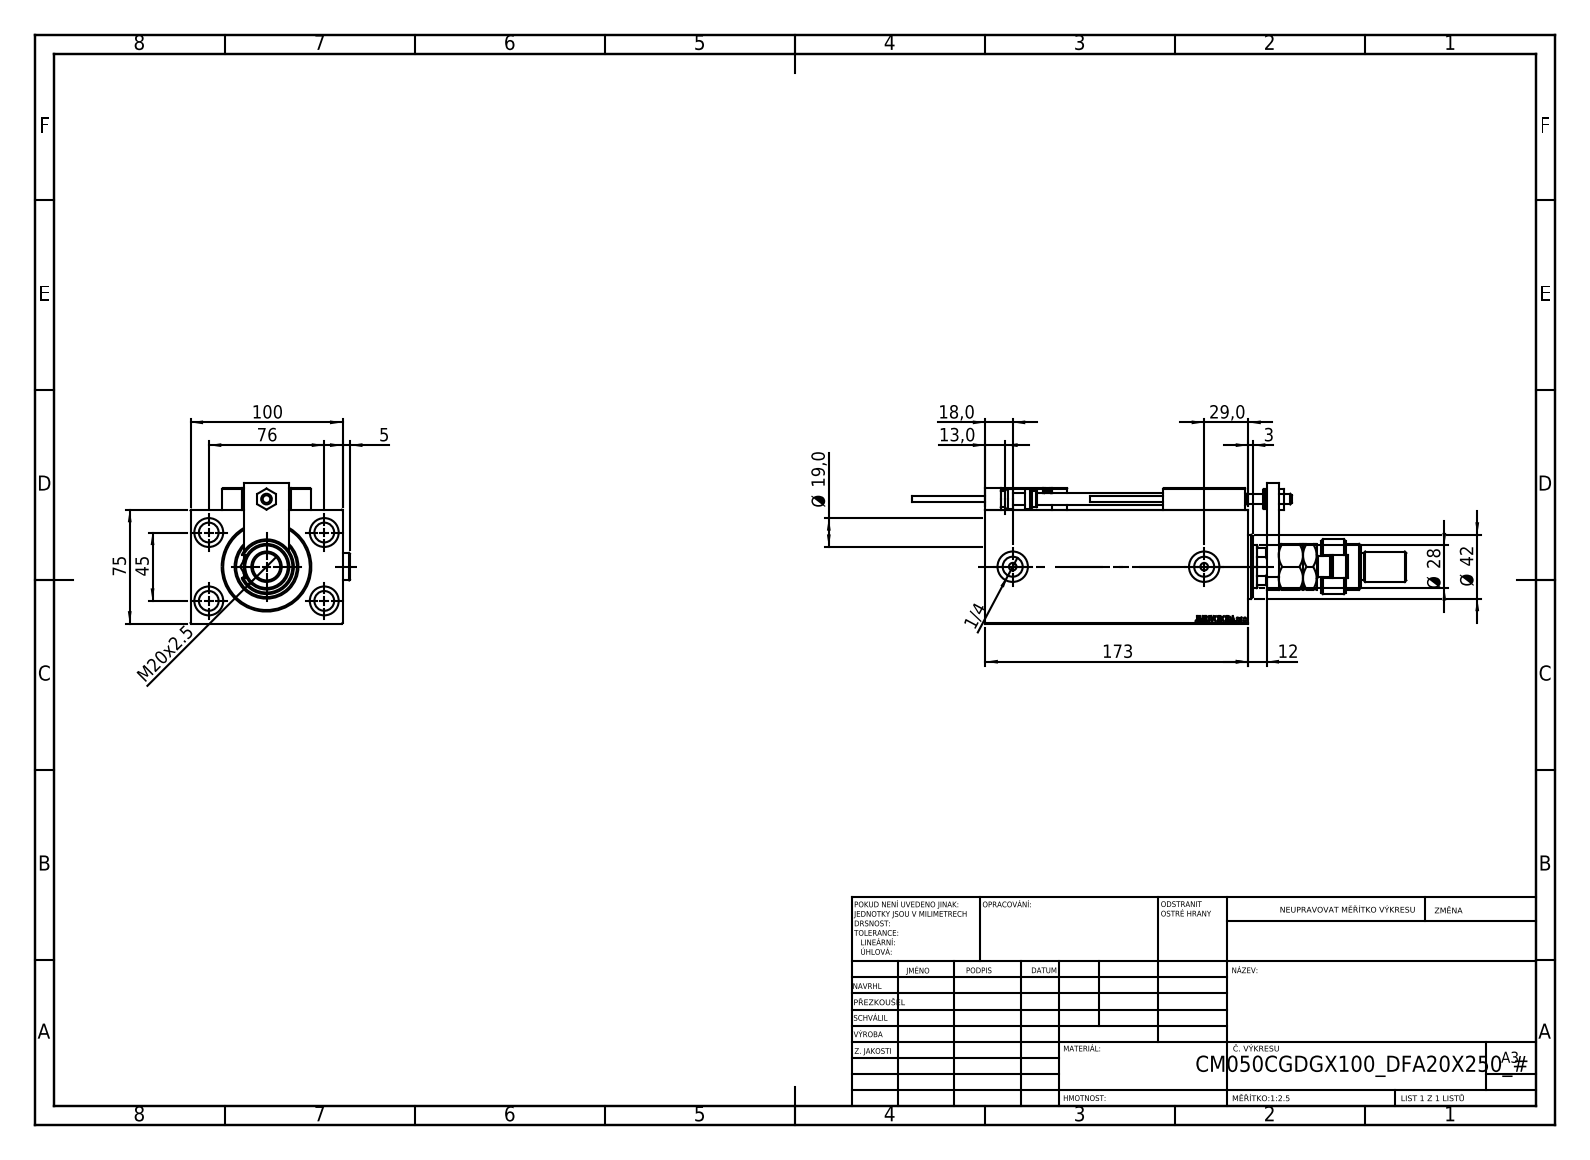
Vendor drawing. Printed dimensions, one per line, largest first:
173
100
76
75
45
Ø 42
29,0
Ø 28
M20x2.5
Ø 19,0
18,0
13,0
12
5
3
1/4
